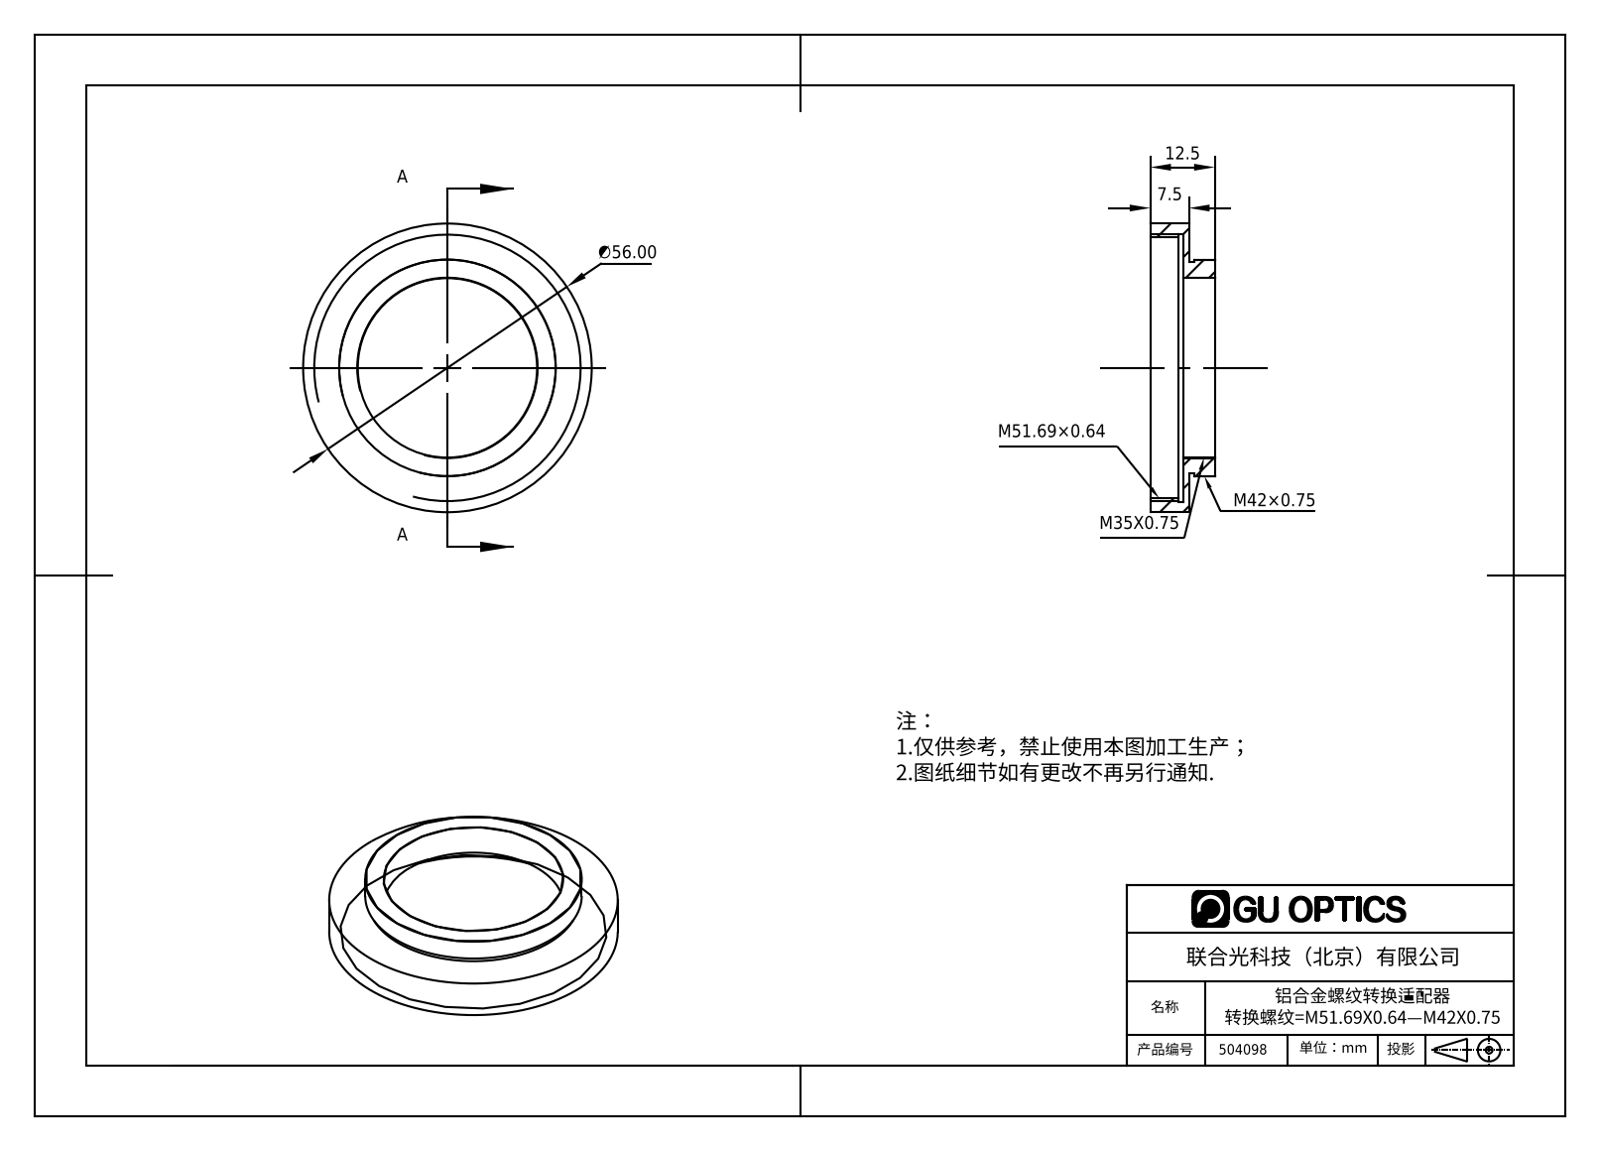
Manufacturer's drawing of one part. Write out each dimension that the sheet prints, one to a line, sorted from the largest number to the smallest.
∅56.00
12.5
7.5
